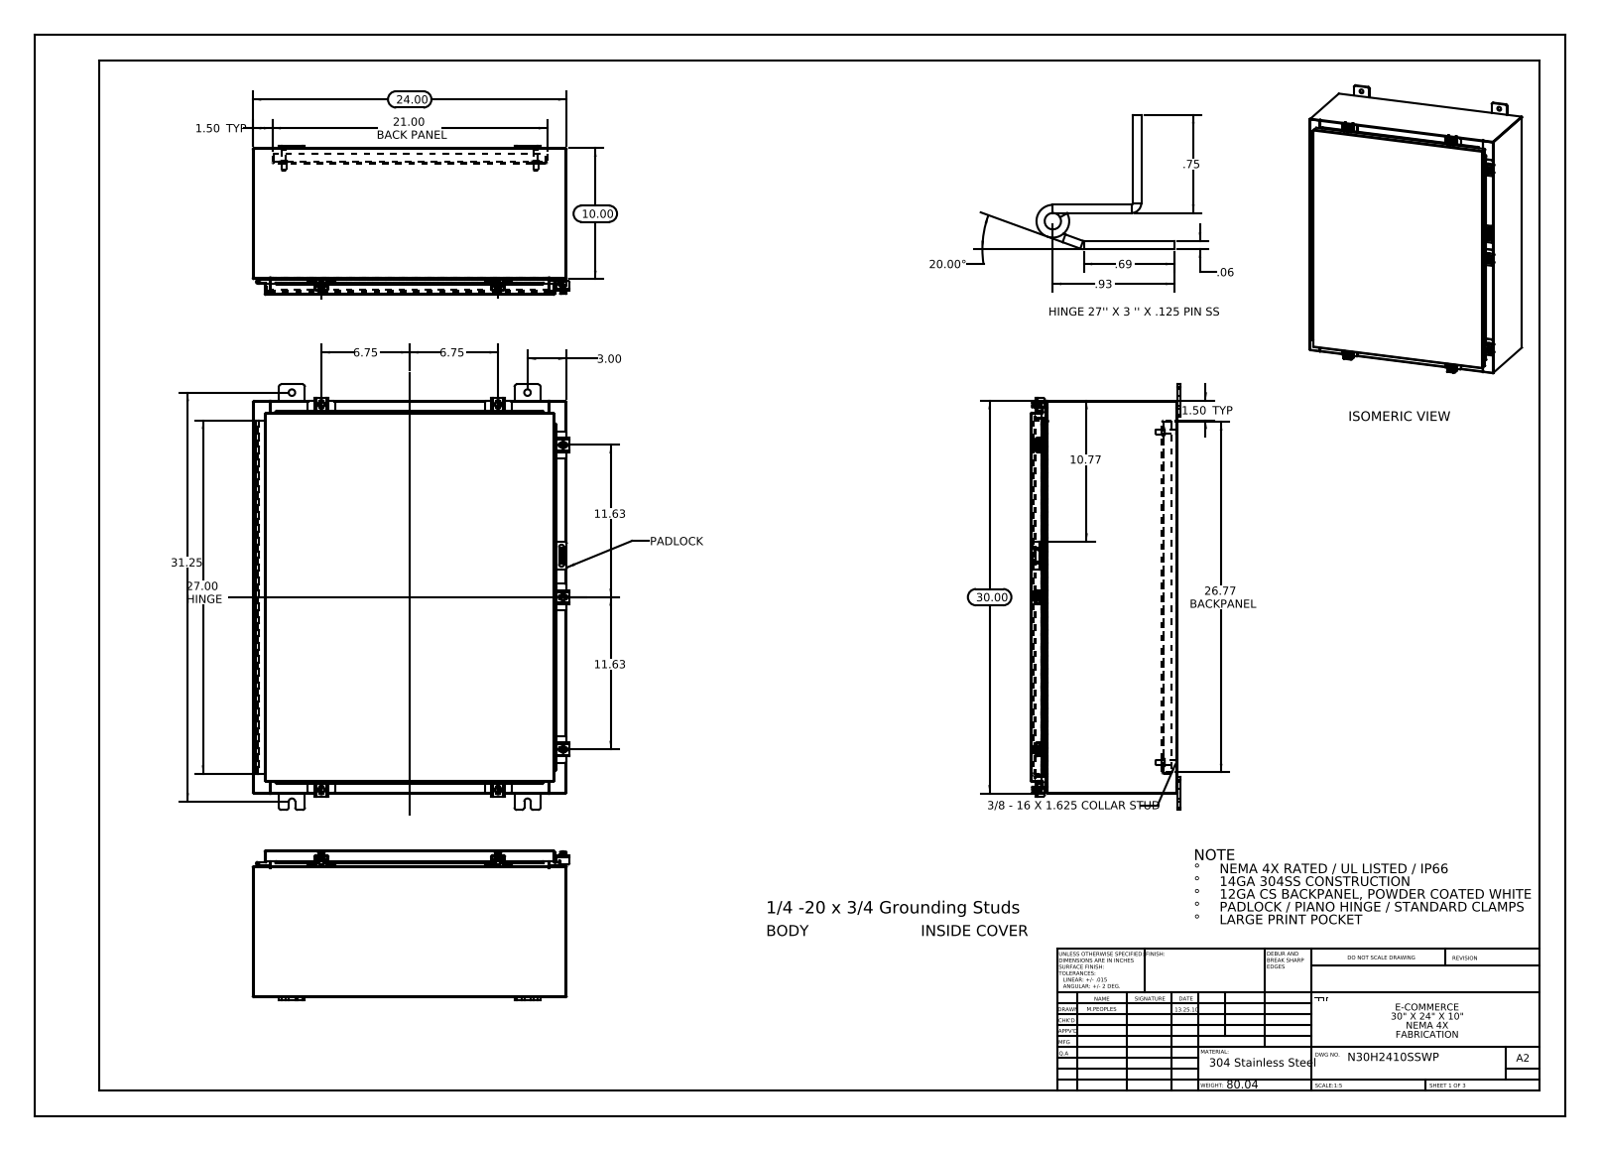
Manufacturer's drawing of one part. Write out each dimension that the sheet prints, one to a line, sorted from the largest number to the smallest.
31.25
30.00
27.00 HINGE
26.77 BACKPANEL
24.00
21.00 BACK PANEL
20.00°
11.63
11.63
10.77
10.00
6.75
6.75
3.00
1.50 TYP
1.50 TYP
.93
.75
.69
.06
